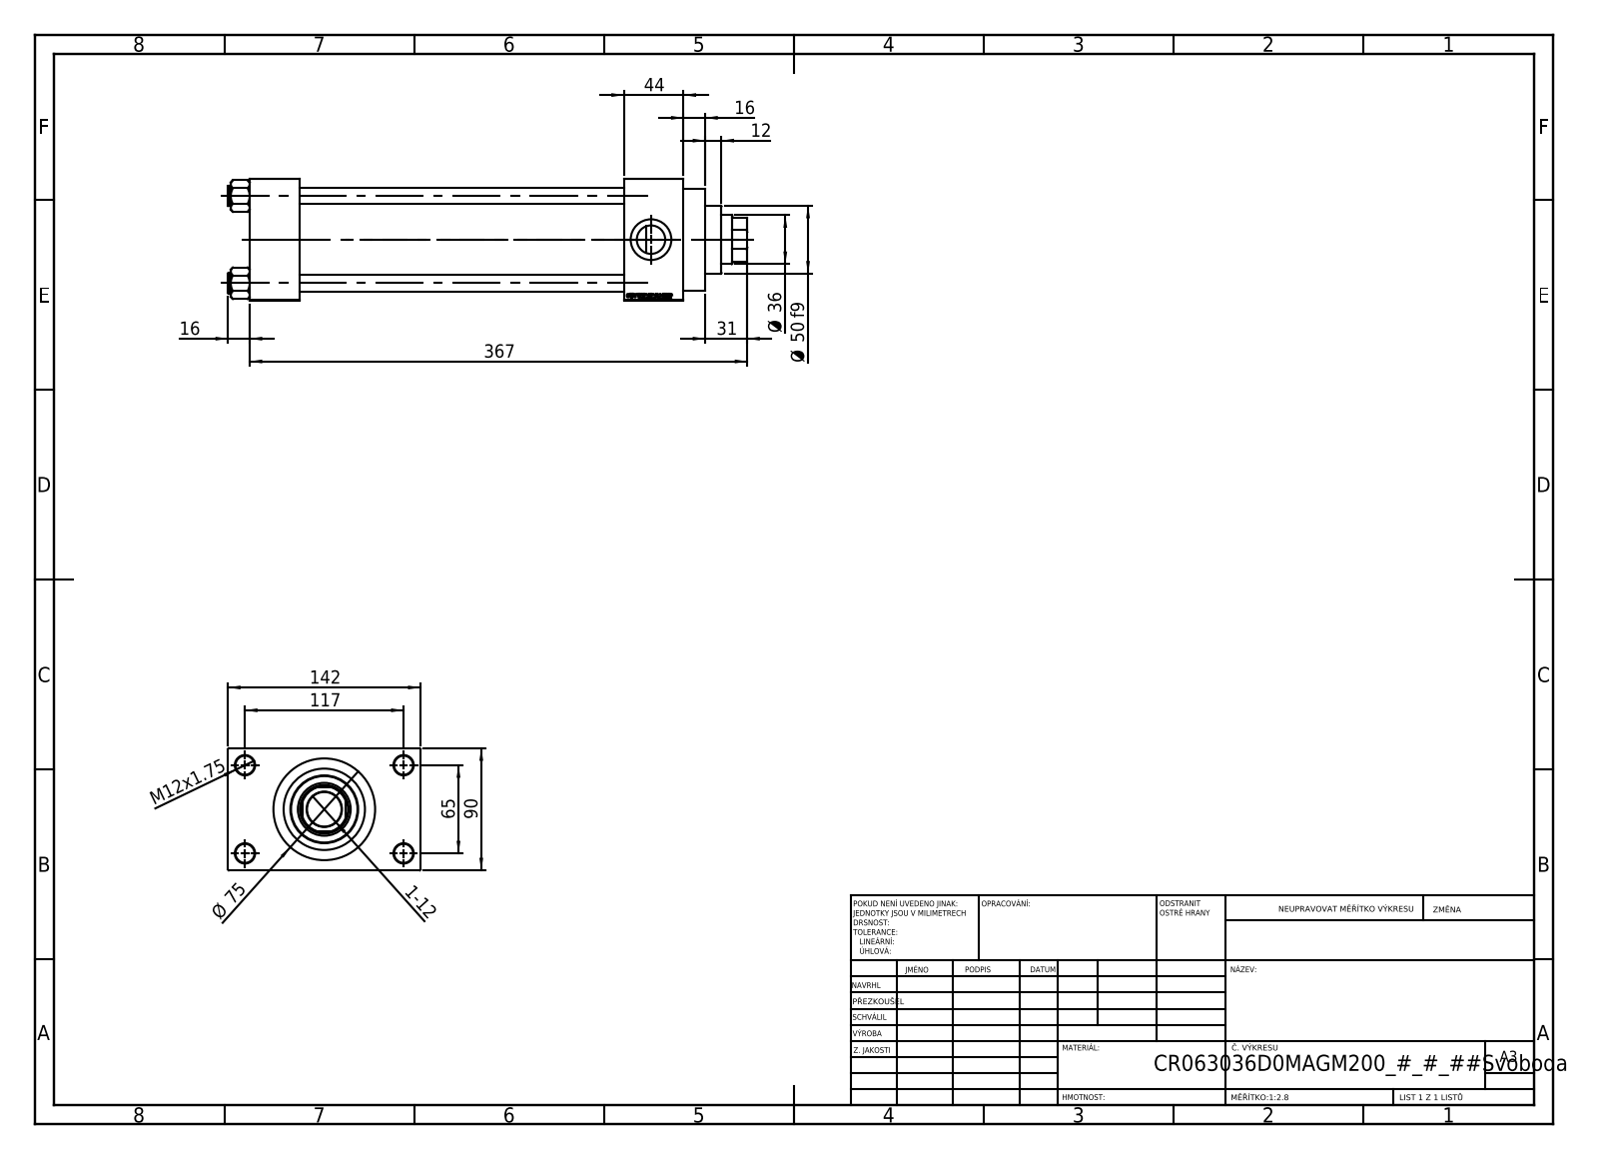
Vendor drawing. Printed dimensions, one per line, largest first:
367
142
117
90
Ø 75
65
Ø 50 f9
44
Ø 36
31
16
16
12
M12x1.75
1-12
